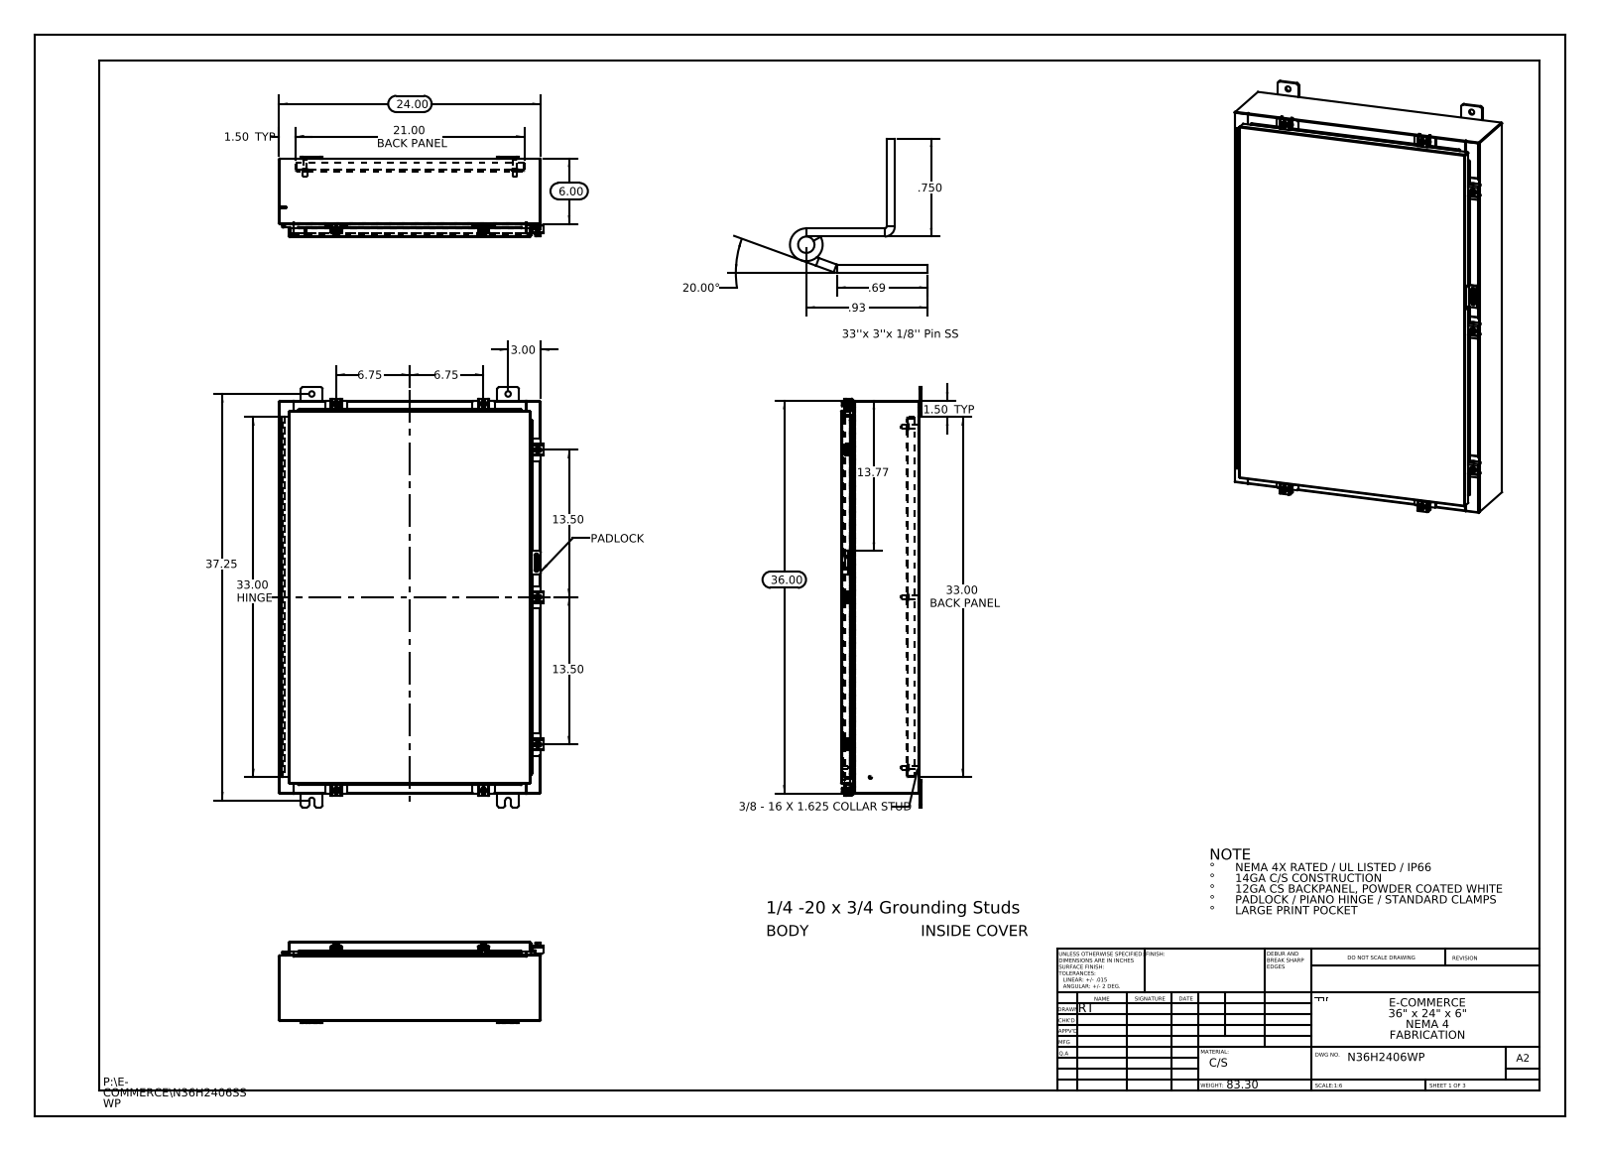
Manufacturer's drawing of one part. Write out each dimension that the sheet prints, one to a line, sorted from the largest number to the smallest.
37.25
36.00
33.00 HINGE
33.00 BACK PANEL
24.00
21.00 BACK PANEL
20.00°
13.77
13.50
13.50
6.75
6.75
6.00
3.00
1.50 TYP
1.50 TYP
.93
.750
.69
